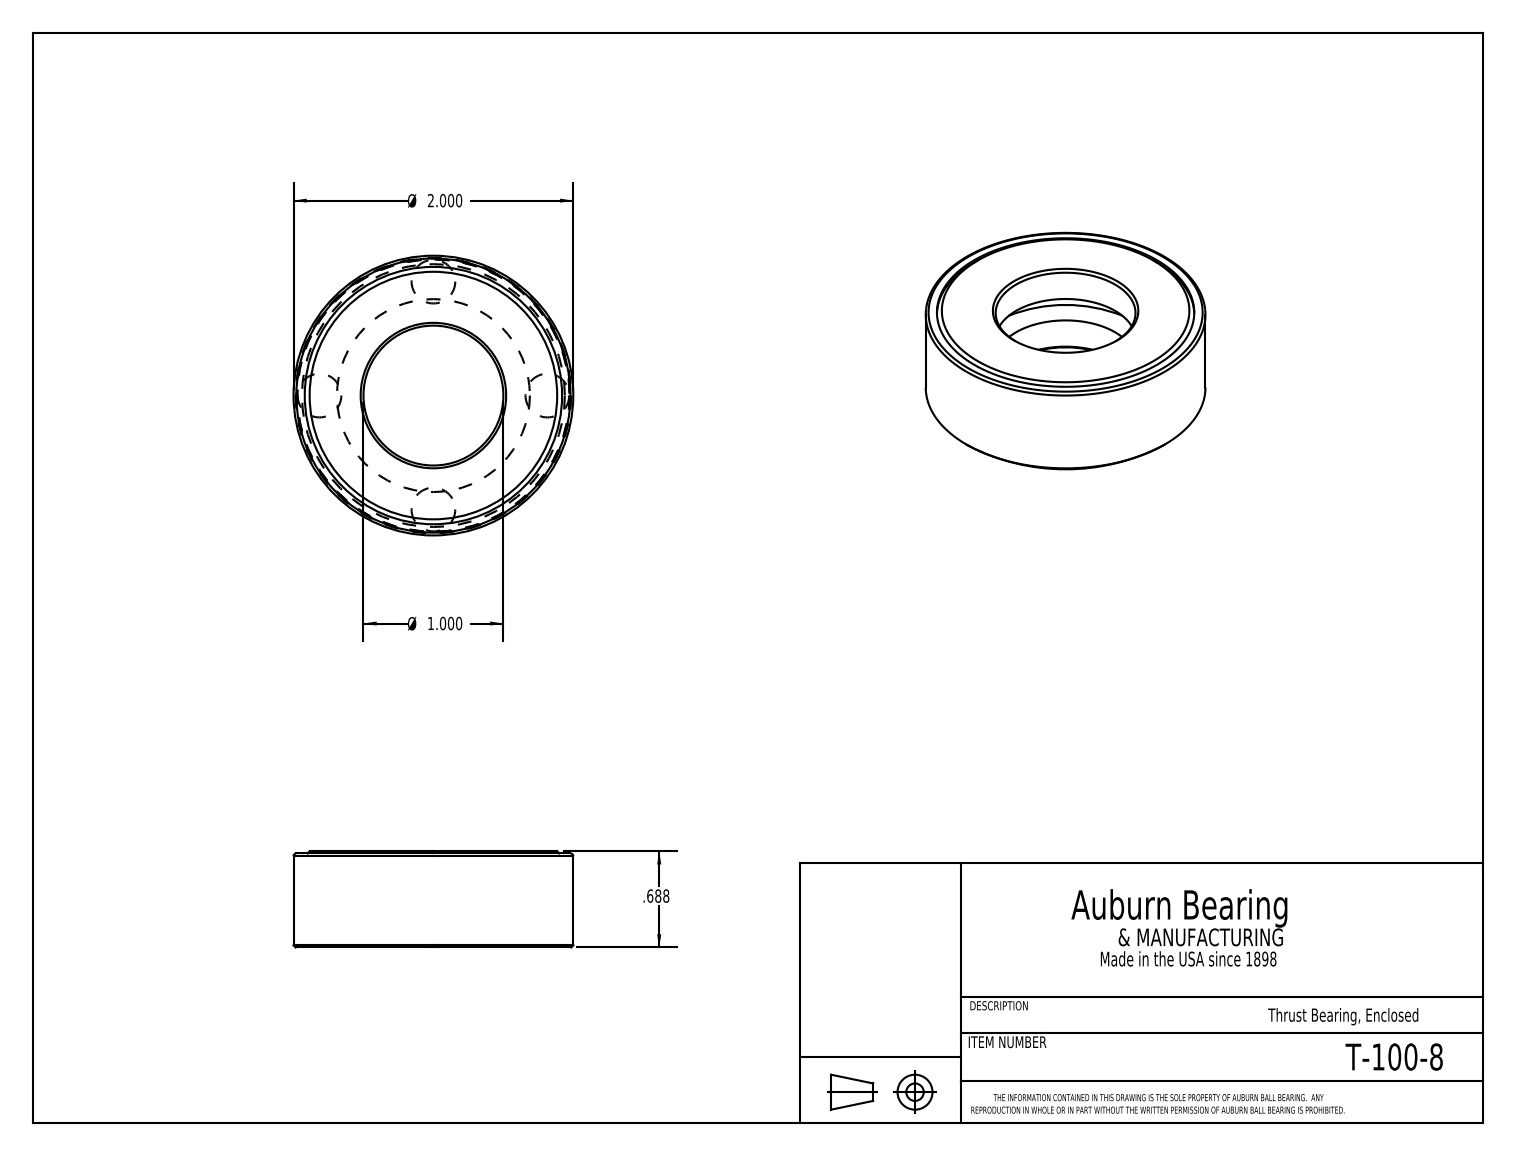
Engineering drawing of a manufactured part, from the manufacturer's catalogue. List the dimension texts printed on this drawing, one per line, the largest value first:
Ø 2.000
Ø 1.000
.688
